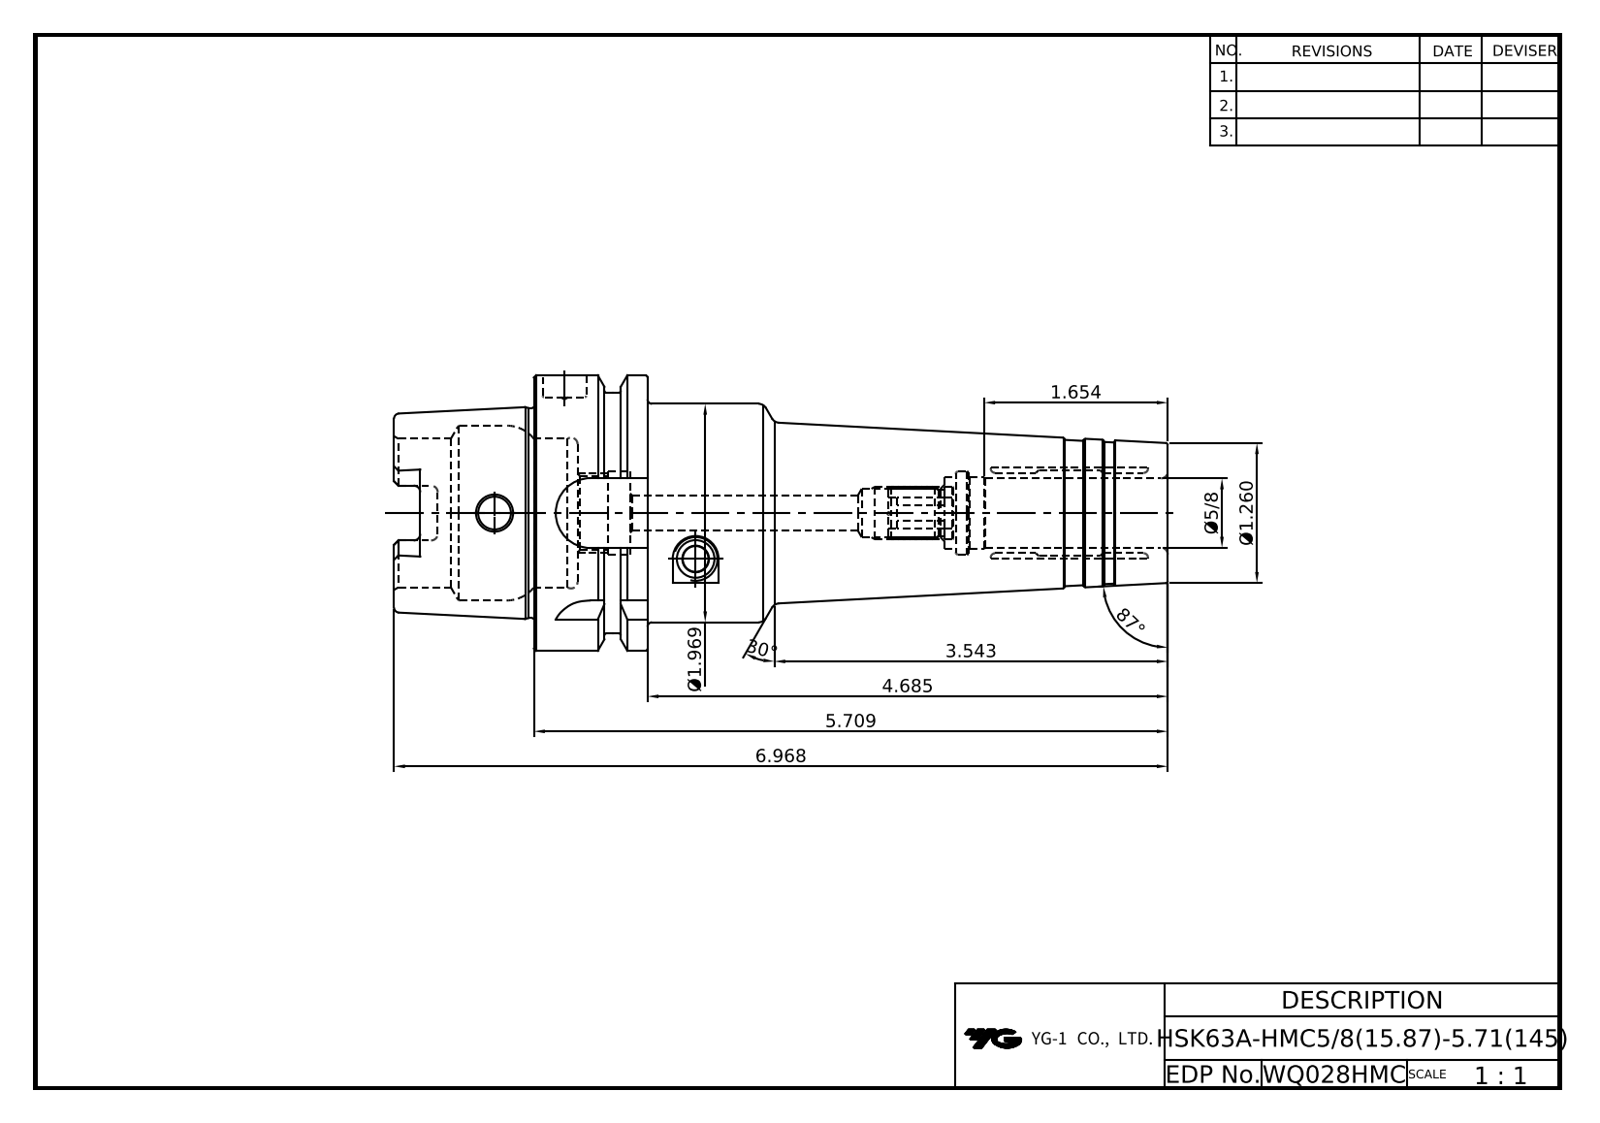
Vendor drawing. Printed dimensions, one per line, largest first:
87°
30°
6.968
5.709
4.685
3.543
Ø1.969
1.654
Ø1.260
Ø5/8
